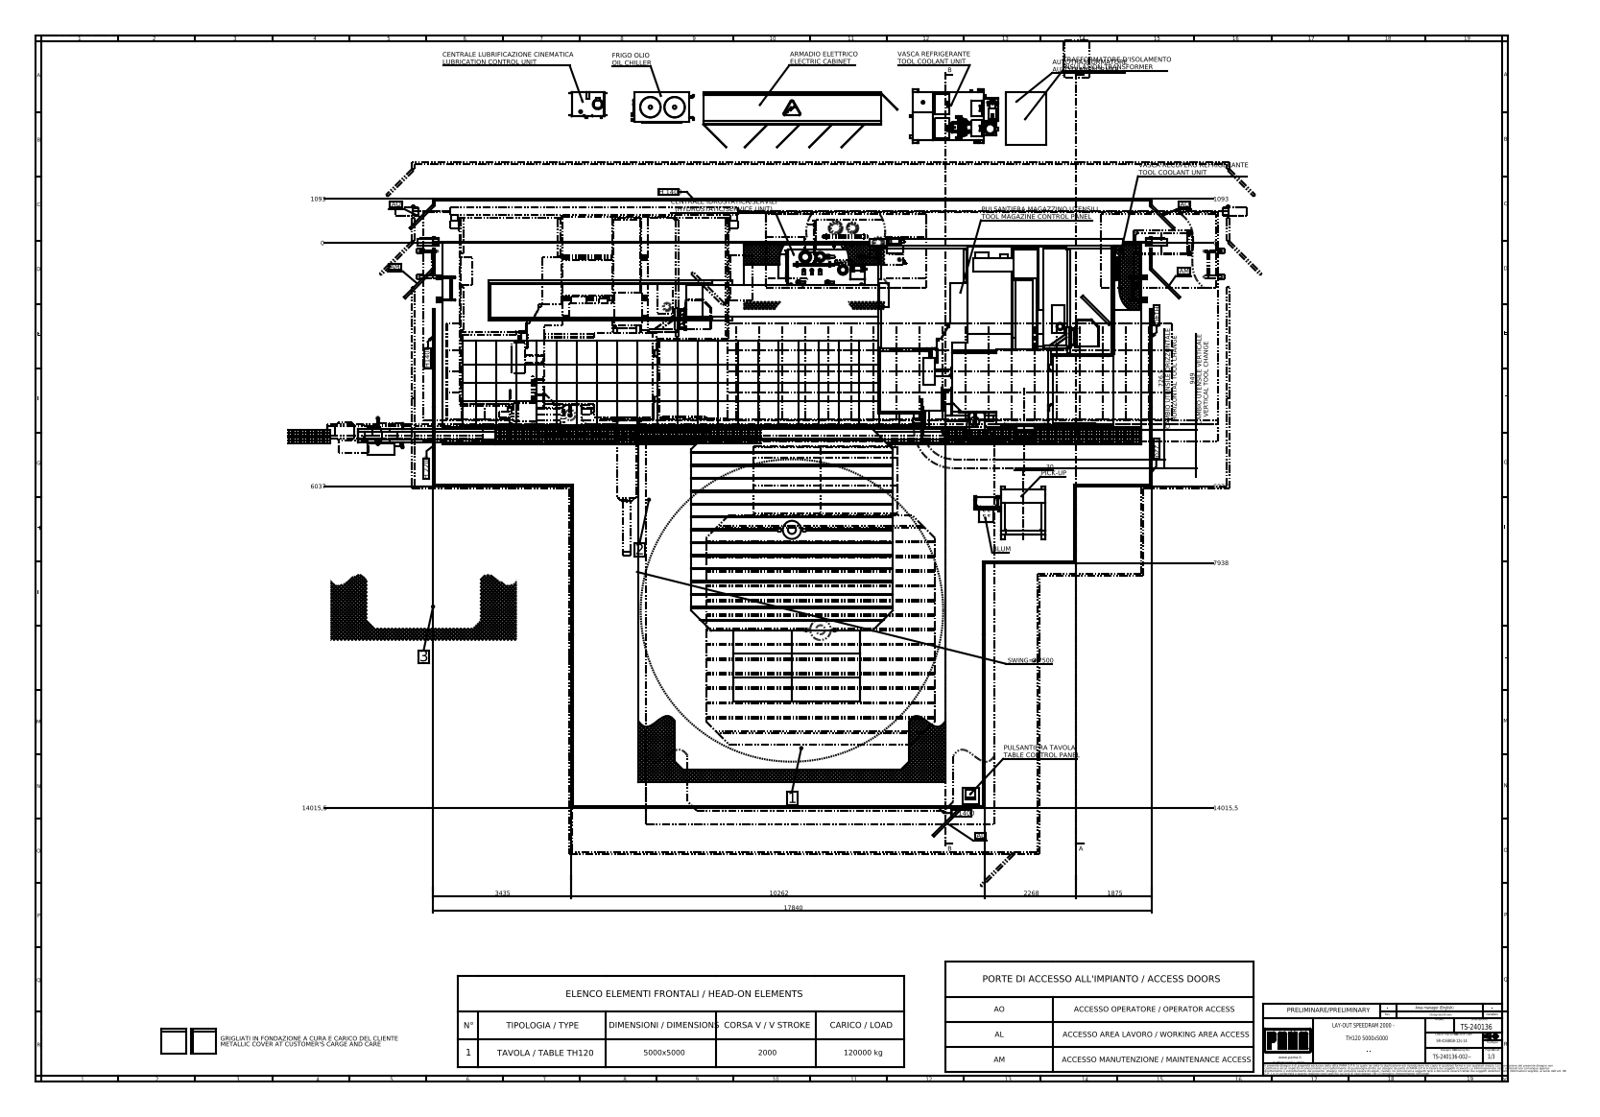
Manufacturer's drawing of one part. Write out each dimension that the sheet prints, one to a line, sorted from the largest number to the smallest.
17840
14015,5
14015,5
10262
7938
SWING= Ø 7500
6037
6037
3435
2268
1875
1093
1093
949 CAMBIO UTENSILE VERTICALE VERTICAL TOOL CHANGE
726,5 CAMBIO UTENSILE ORIZZONTALE HORIZONTAL TOOL CHANGE
30
0
0
